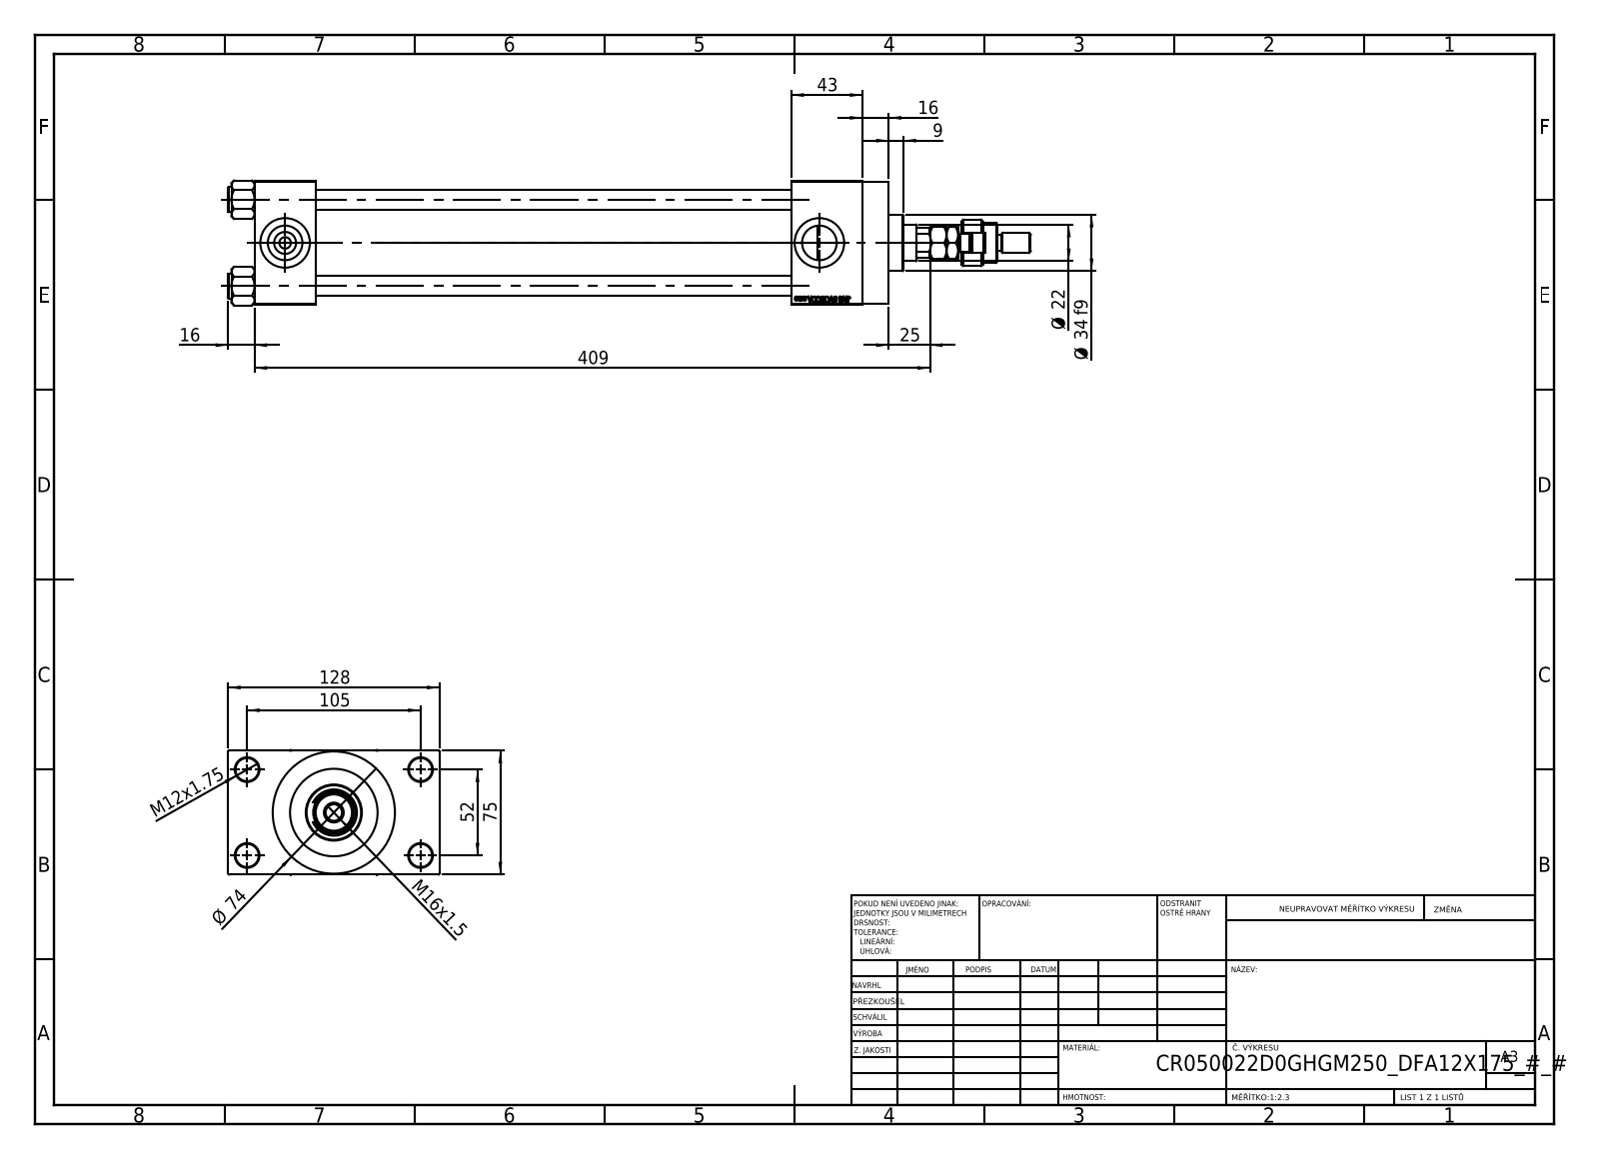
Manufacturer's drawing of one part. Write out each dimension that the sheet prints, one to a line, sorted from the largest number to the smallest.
409
128
105
75
Ø 74
52
43
Ø 34 f9
25
Ø 22
16
16
M16x1.5
M12x1.75
9
